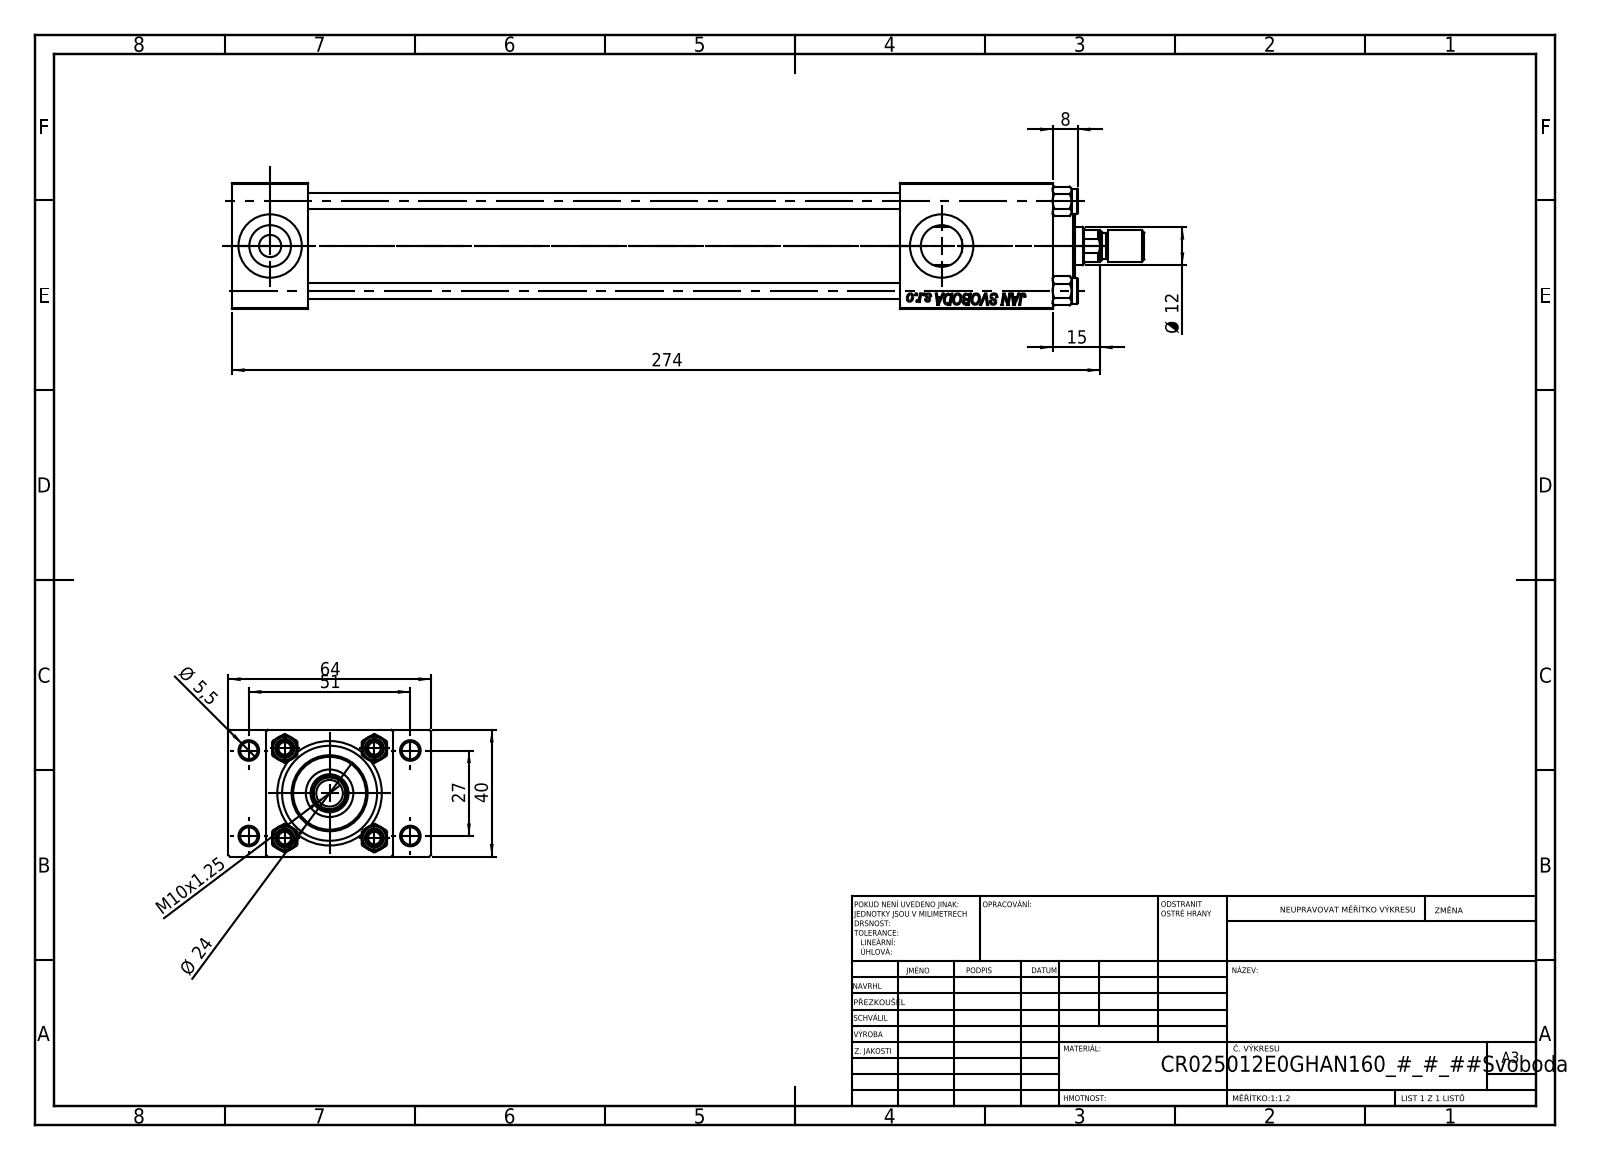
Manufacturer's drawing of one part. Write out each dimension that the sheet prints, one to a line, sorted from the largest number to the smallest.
274
64
51
40
27
Ø 24
15
Ø 12
M10x1.25
8
Ø 5,5
